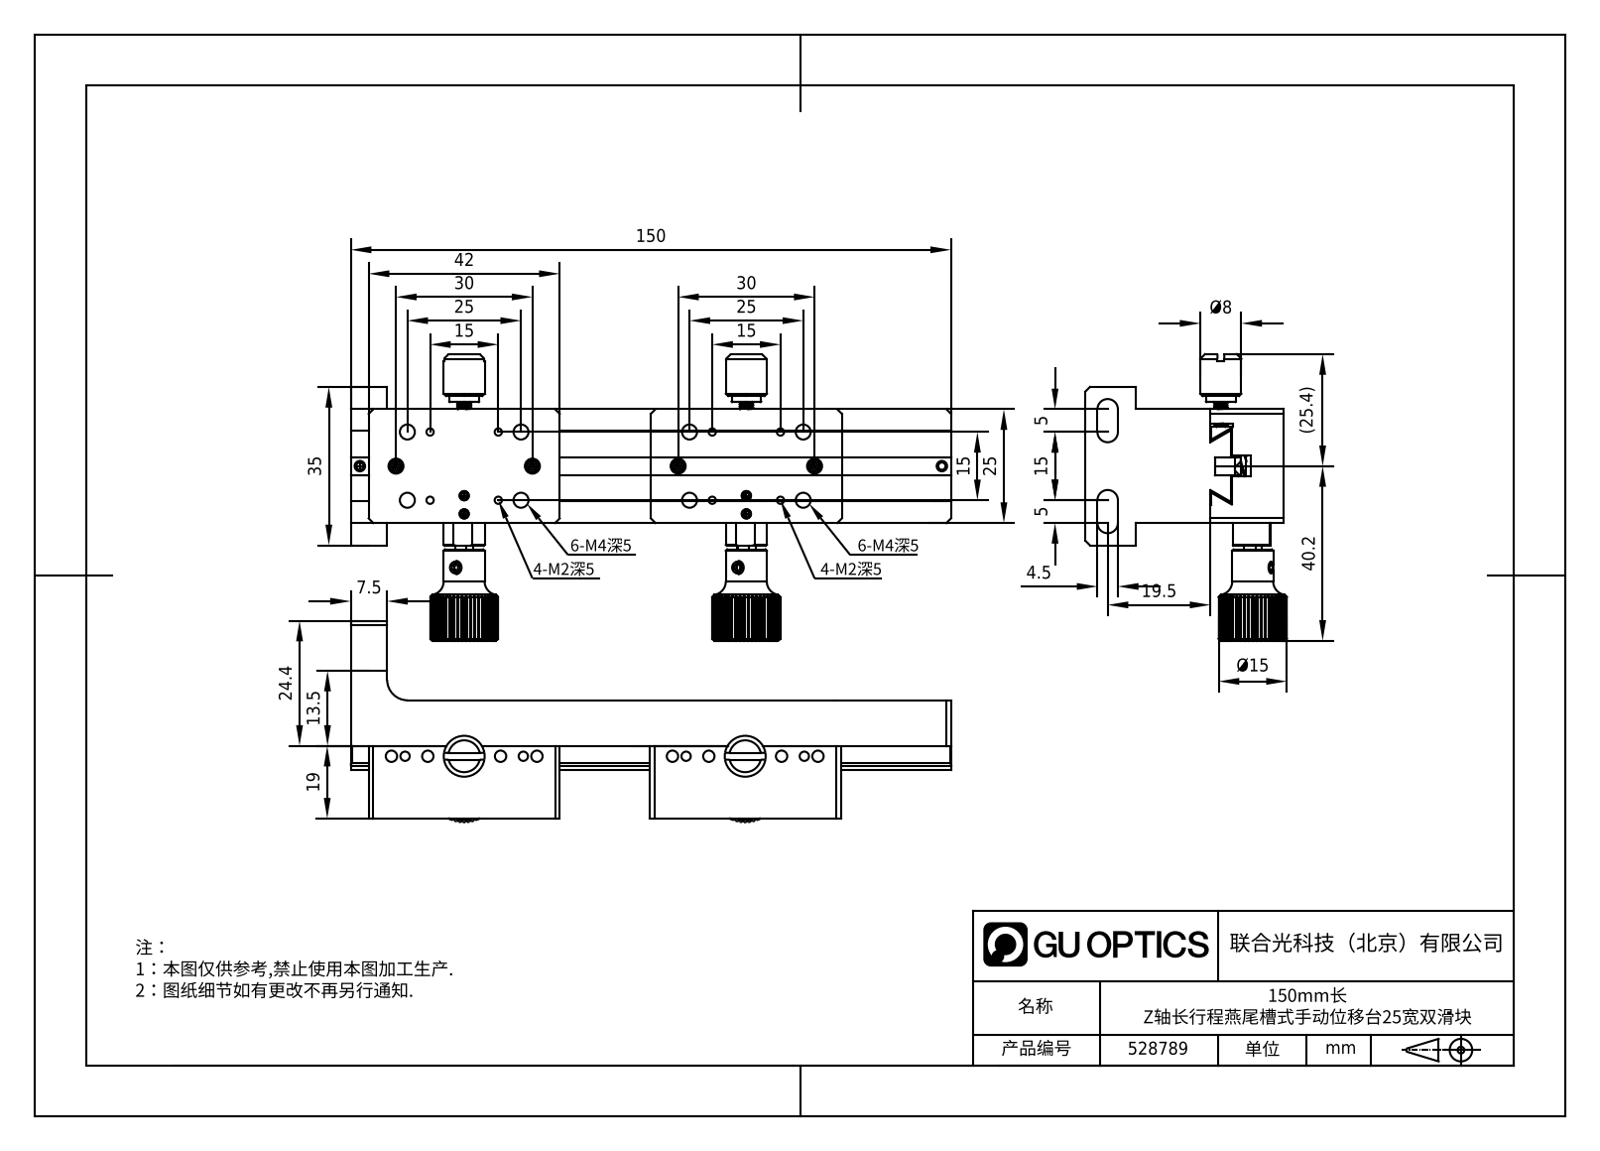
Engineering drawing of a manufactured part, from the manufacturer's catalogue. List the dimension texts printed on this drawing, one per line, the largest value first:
150
42
40.2
35
30
30
(25.4)
25
25
25
24.4
19.5
19
Ø15
15
15
15
15
13.5
Ø8
7.5
5
5
4.5
